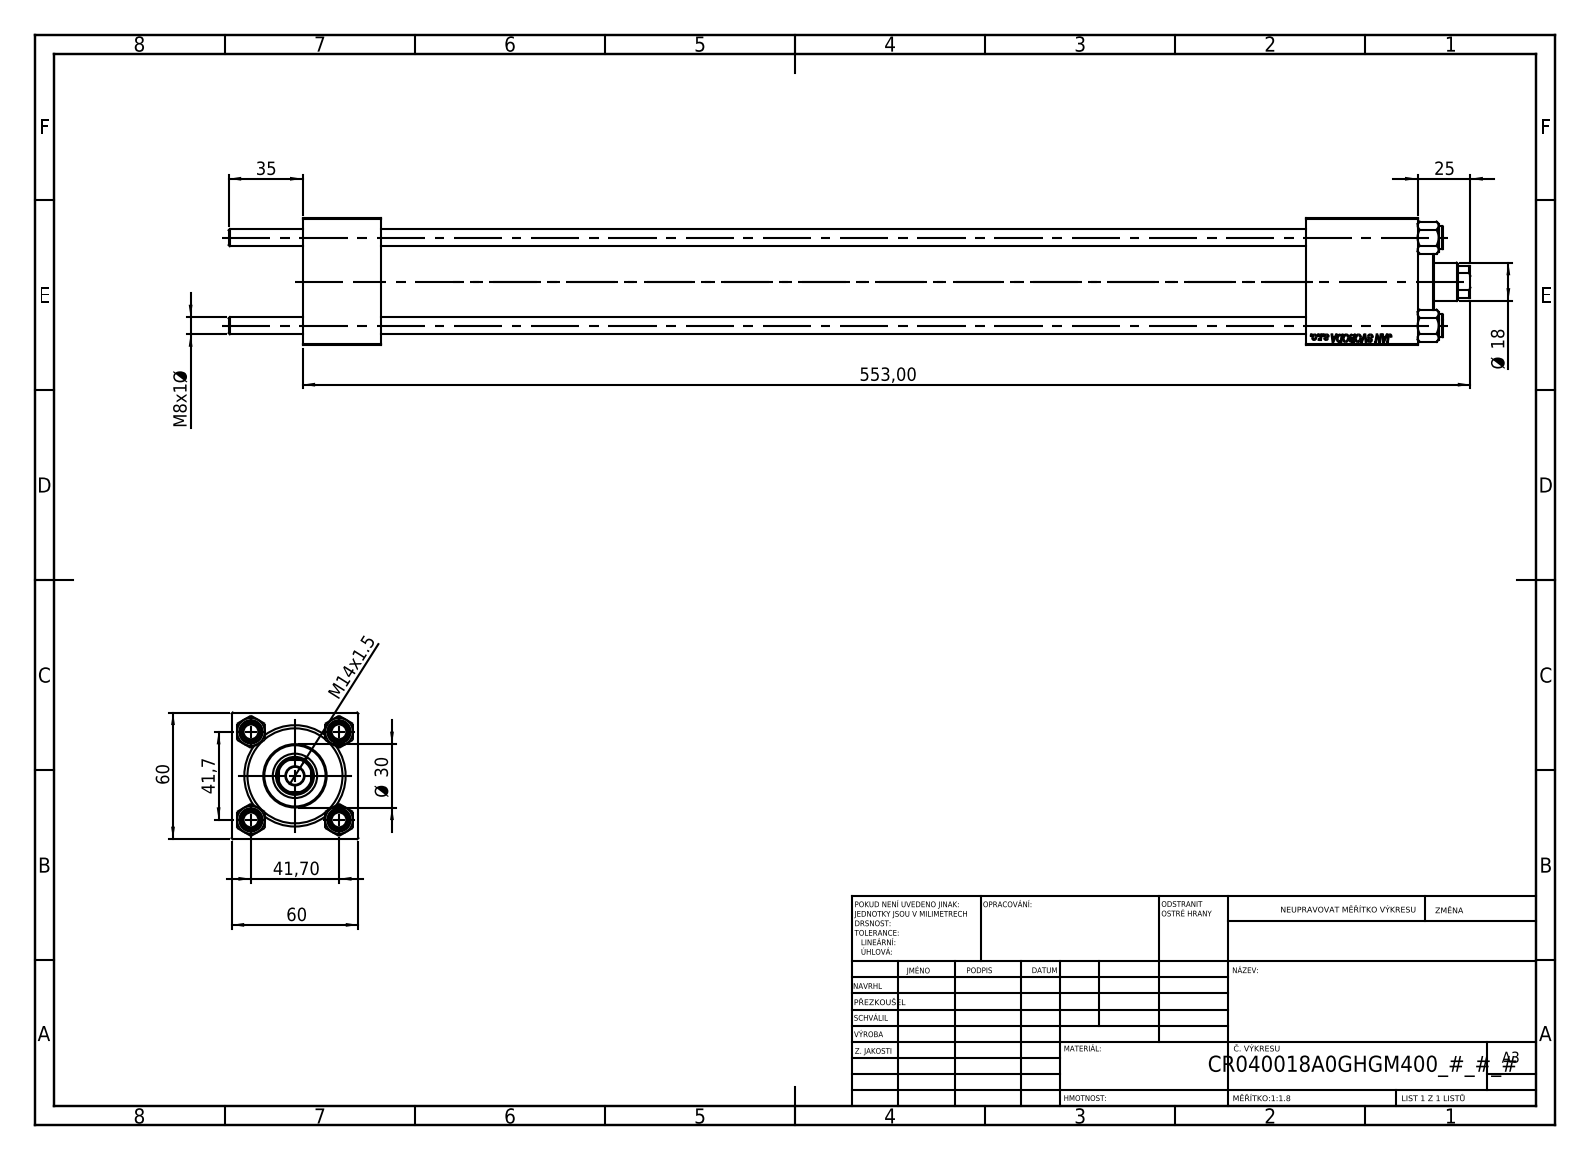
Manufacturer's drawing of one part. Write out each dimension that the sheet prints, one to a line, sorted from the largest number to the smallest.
553,00
60
60
41,7
41,70
35
Ø 30
25
Ø 18
M14x1.5
M8x1 Ø
